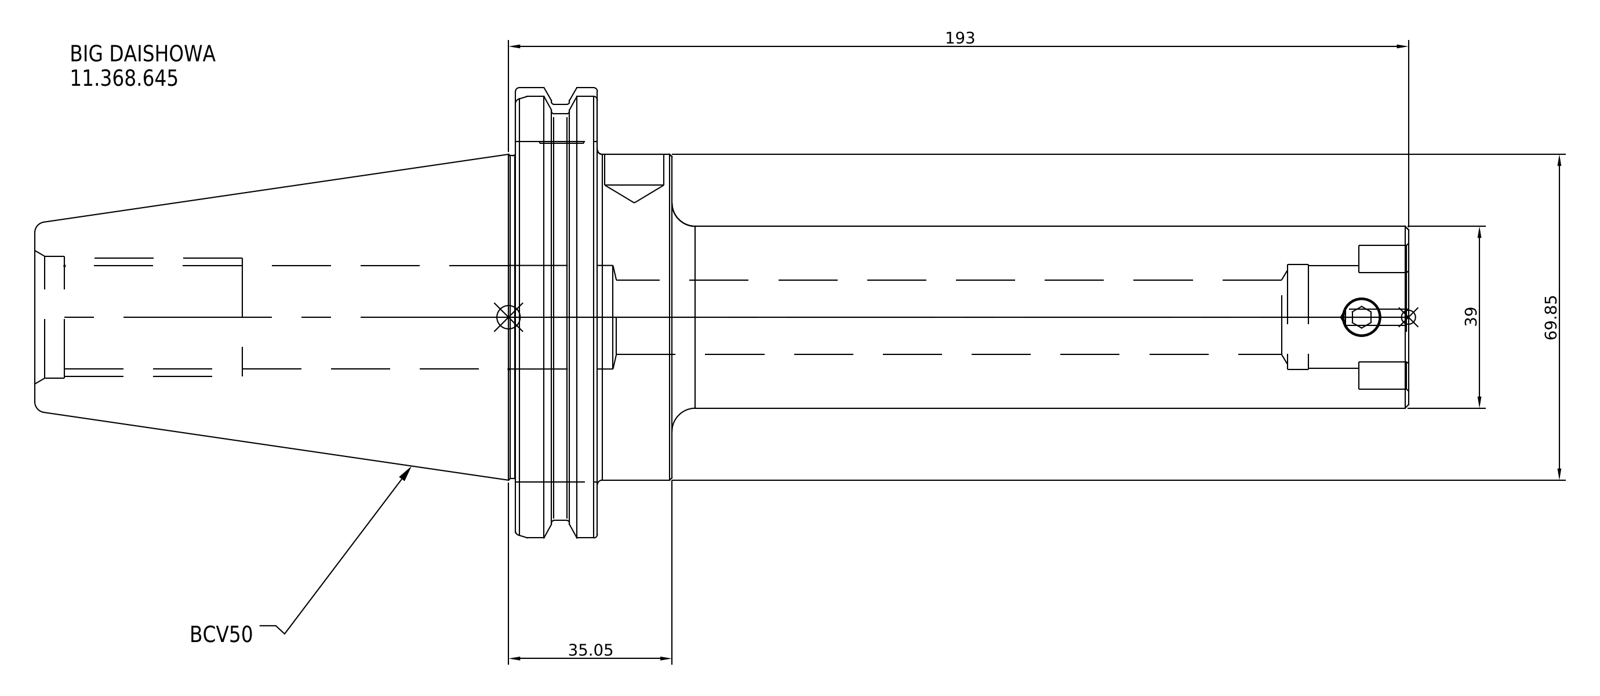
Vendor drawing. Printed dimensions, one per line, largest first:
193
69.85
39
35.05
